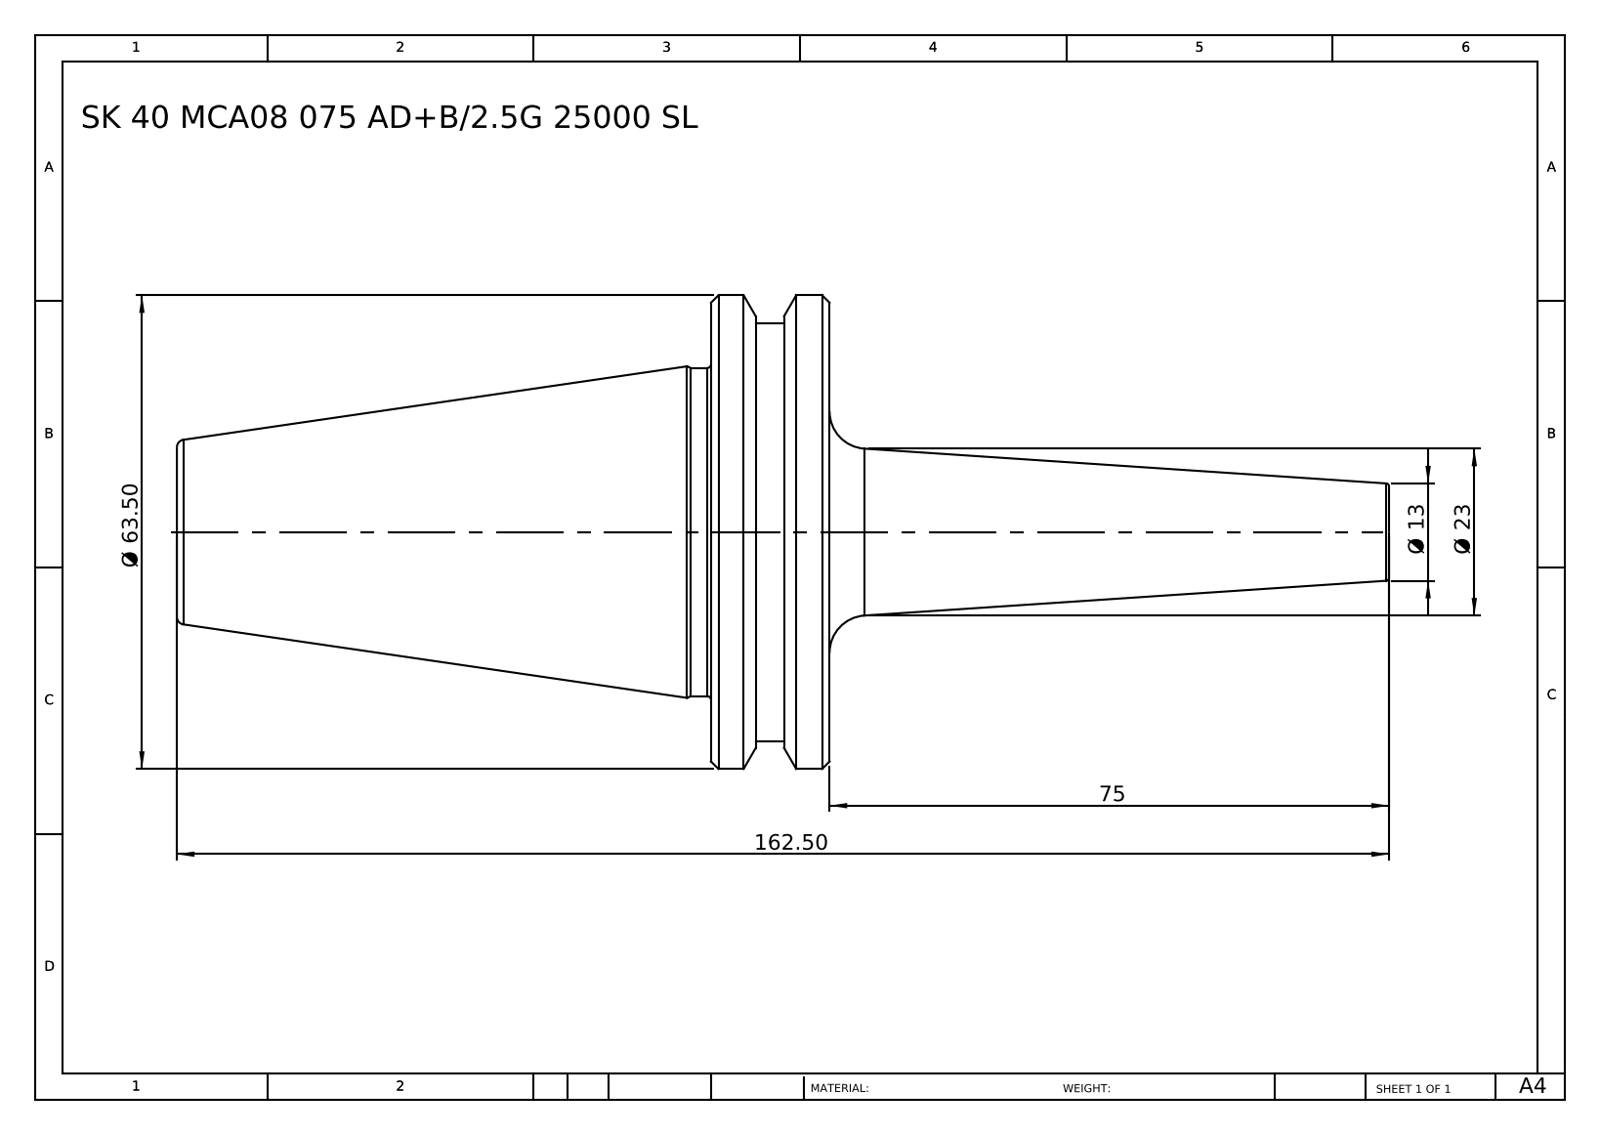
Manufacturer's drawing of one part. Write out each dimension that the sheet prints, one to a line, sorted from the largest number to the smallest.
162.50
75
Ø 63.50
Ø 23
Ø 13
